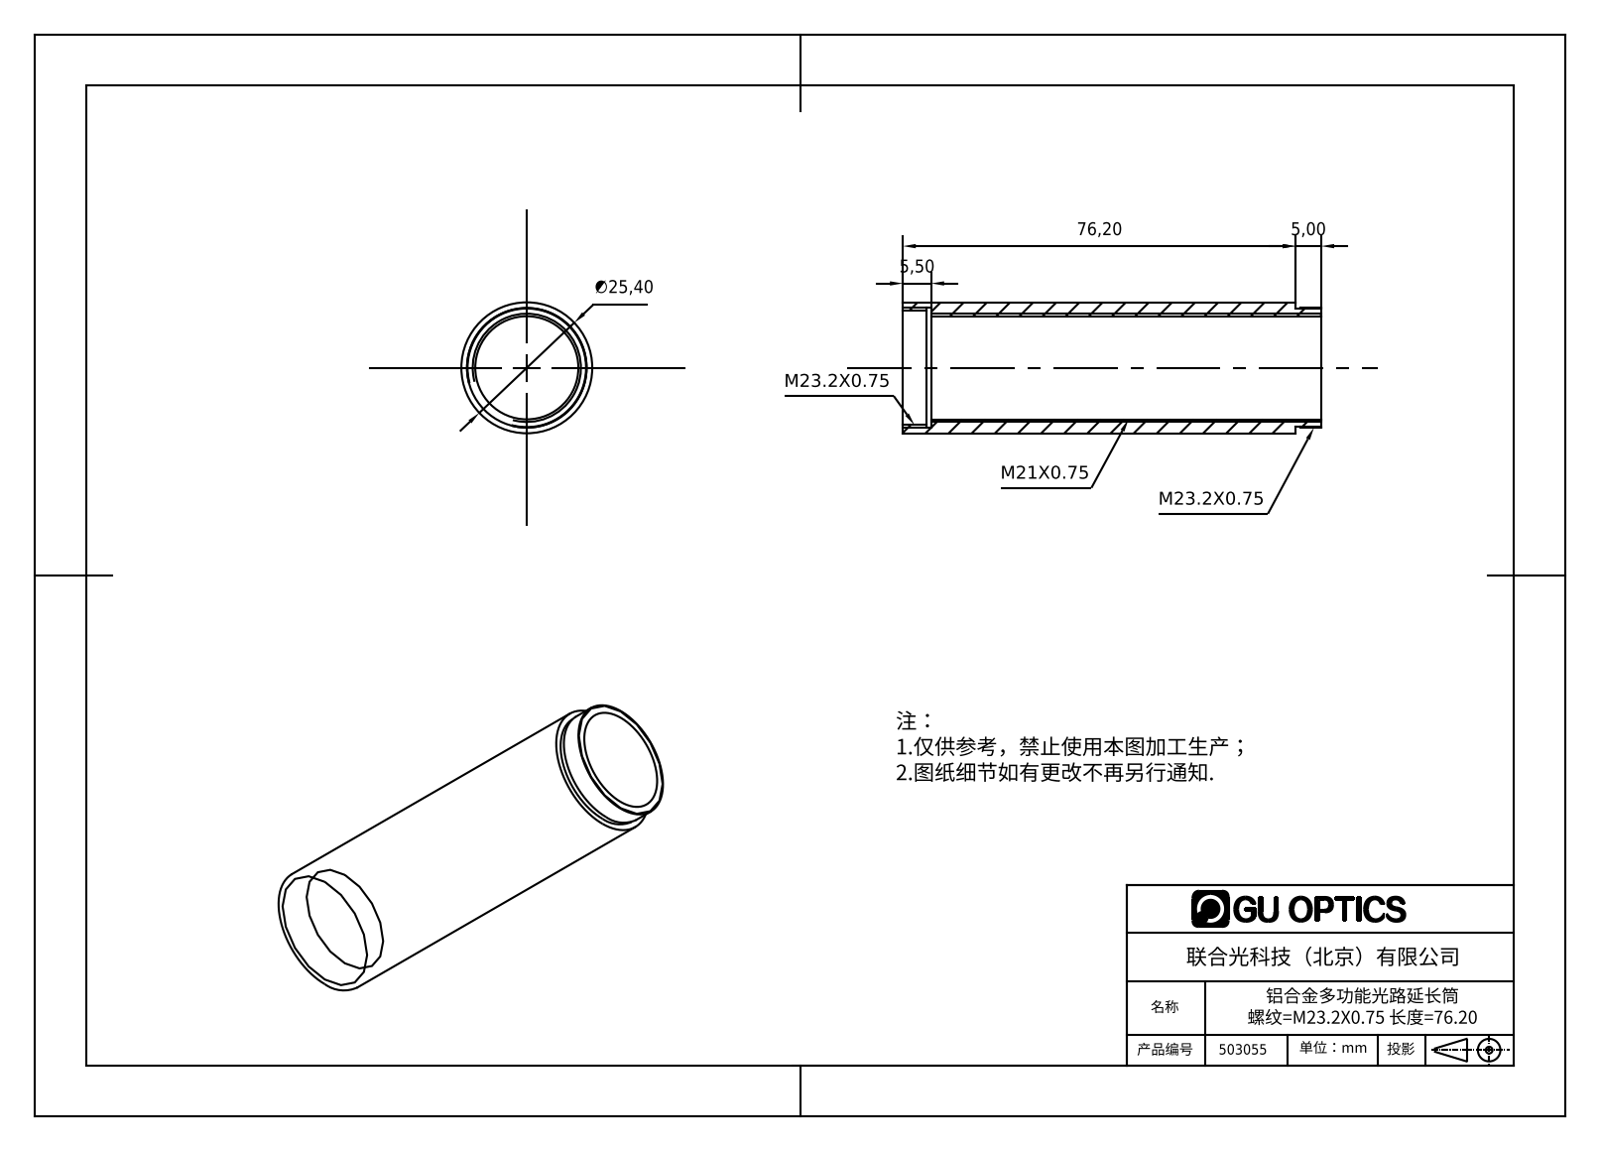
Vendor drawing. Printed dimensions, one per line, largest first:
76,20
∅25,40
5,50
5,00
